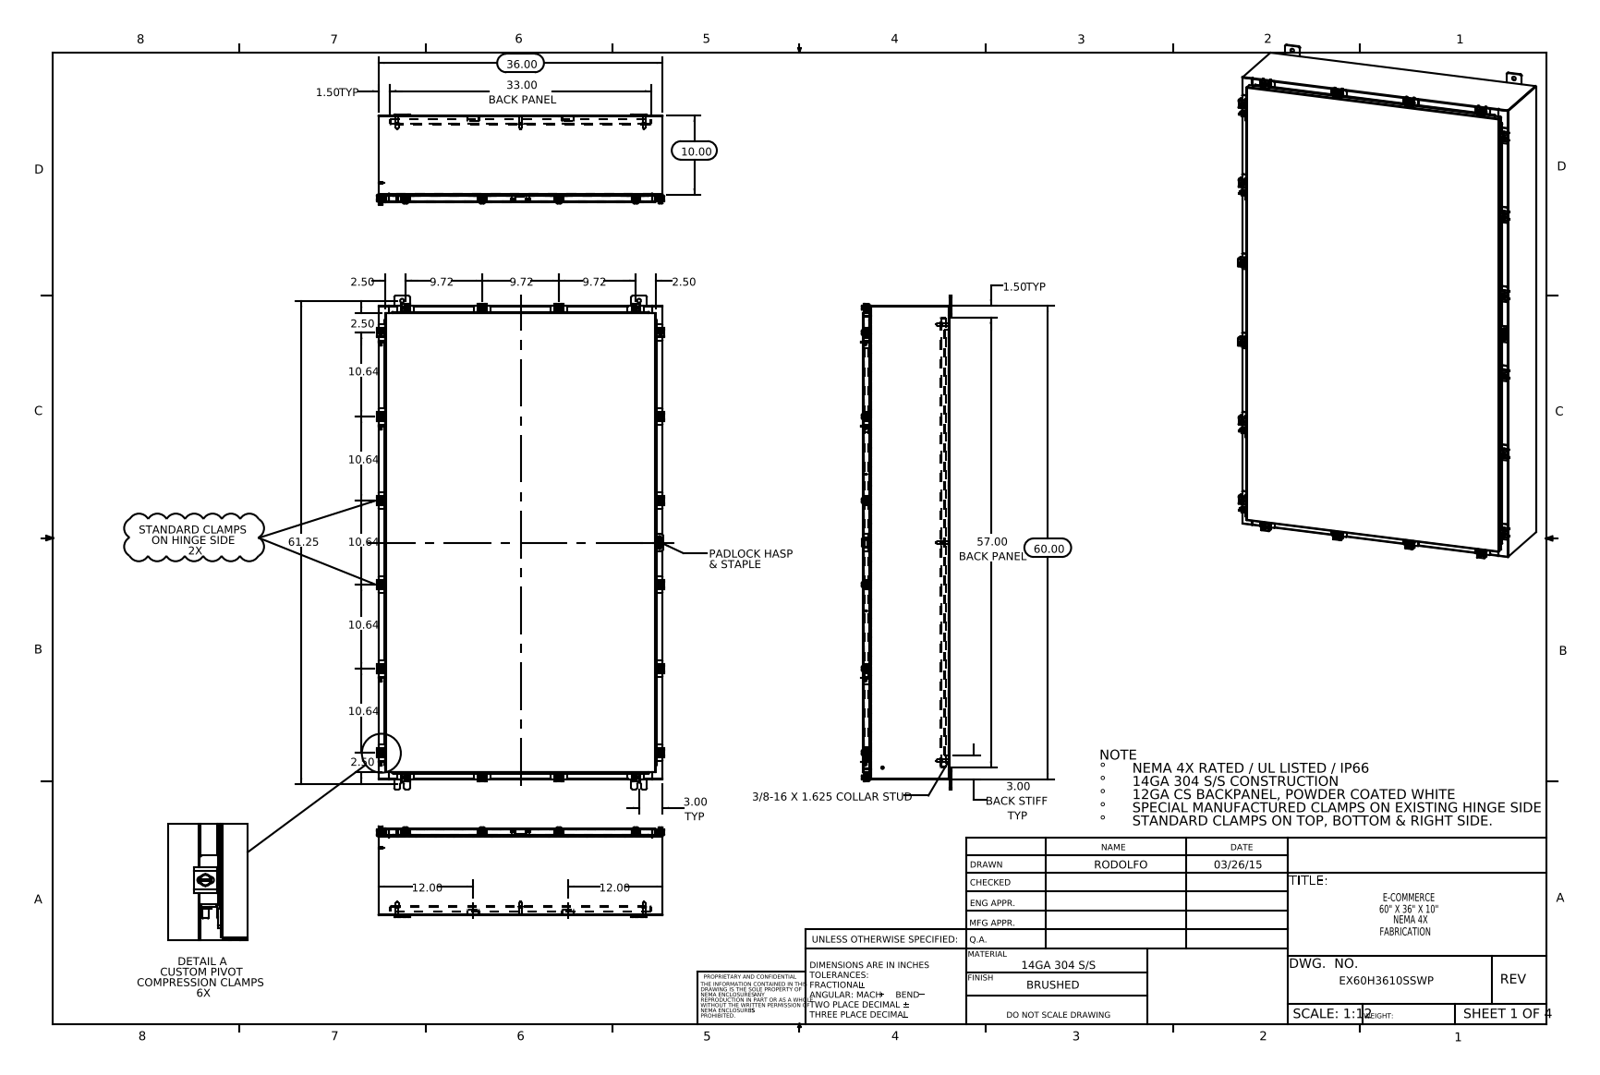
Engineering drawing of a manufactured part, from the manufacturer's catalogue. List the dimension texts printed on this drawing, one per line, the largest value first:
61.25
60.00
57.00 BACK PANEL
36.00
33.00 BACK PANEL
12.00
12.00
10.64
10.64
10.64
10.64
10.64
10.00
9.72
9.72
9.72
3.00 TYP
3.00 BACK STIFF TYP
2.50
2.50
2.50
2.50
1.50 TYP
1.50 TYP
